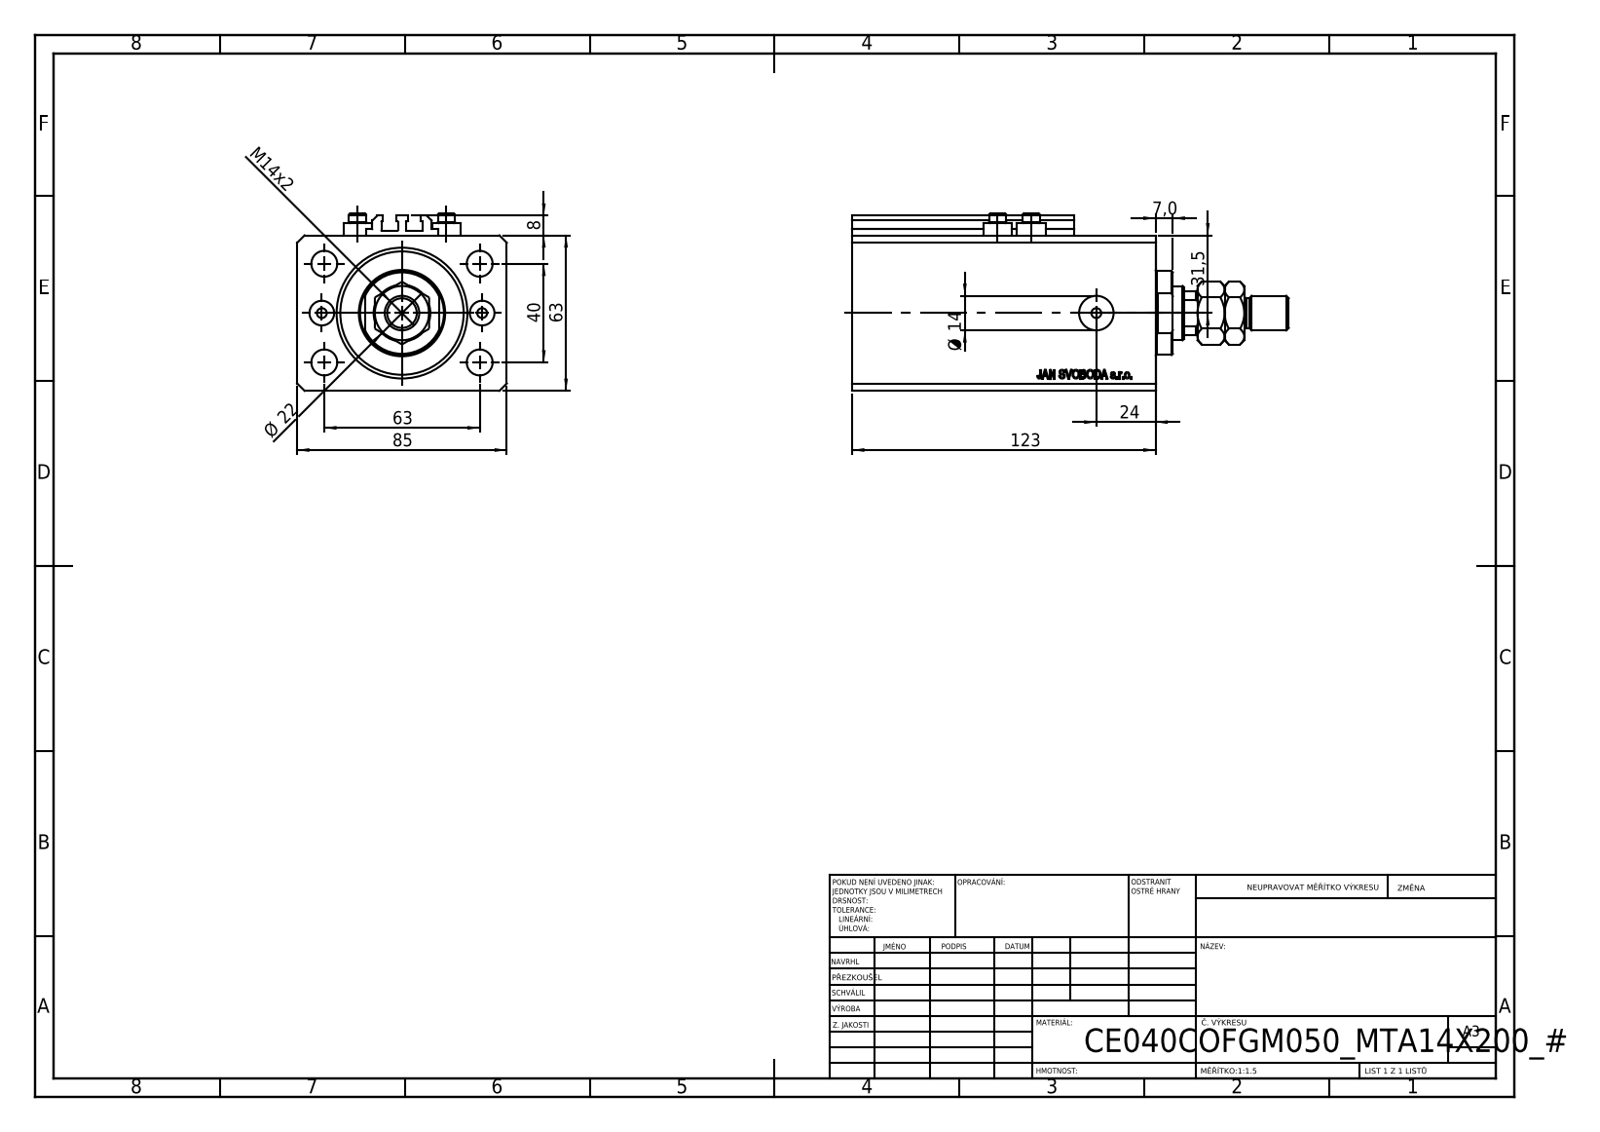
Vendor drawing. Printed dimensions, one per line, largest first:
123
85
63
63
40
31,5
24
Ø 22
M14x2
Ø 14
8
7,0
